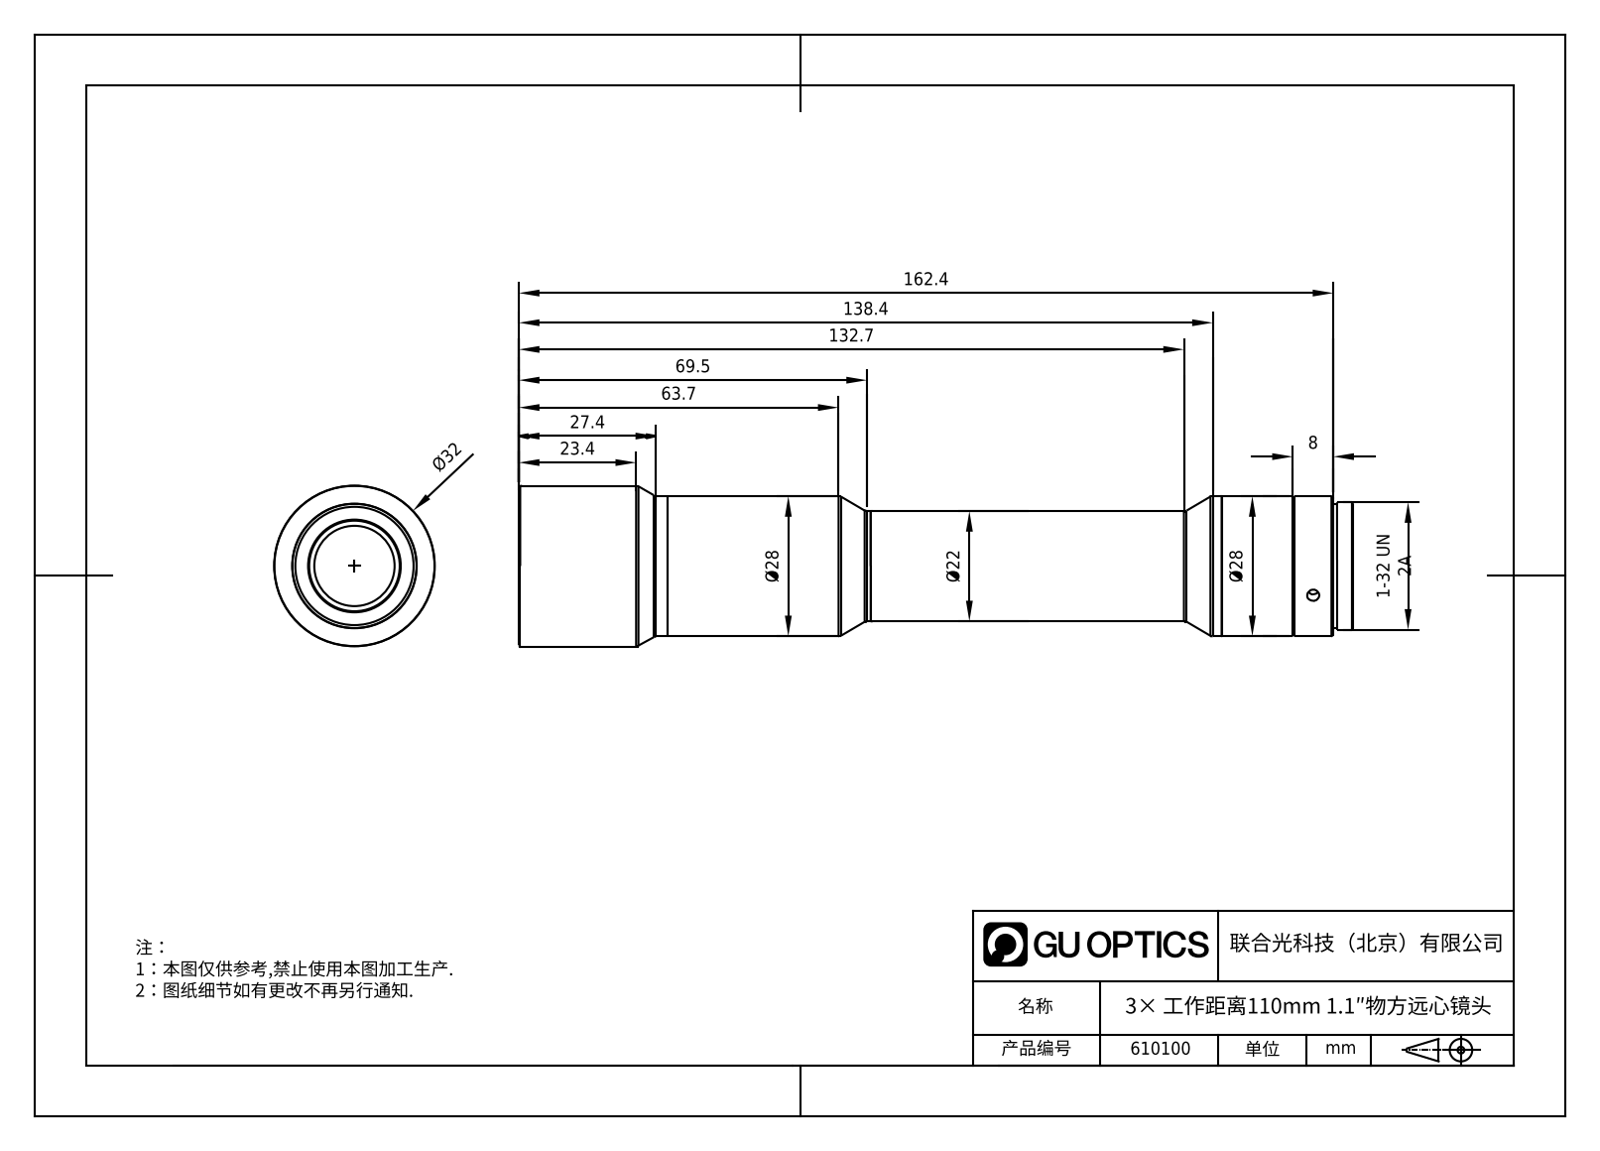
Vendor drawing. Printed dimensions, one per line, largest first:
162.4
138.4
132.7
69.5
63.7
Ø32
Ø28
Ø28
27.4
23.4
Ø22
8
1-32 UN 2A
